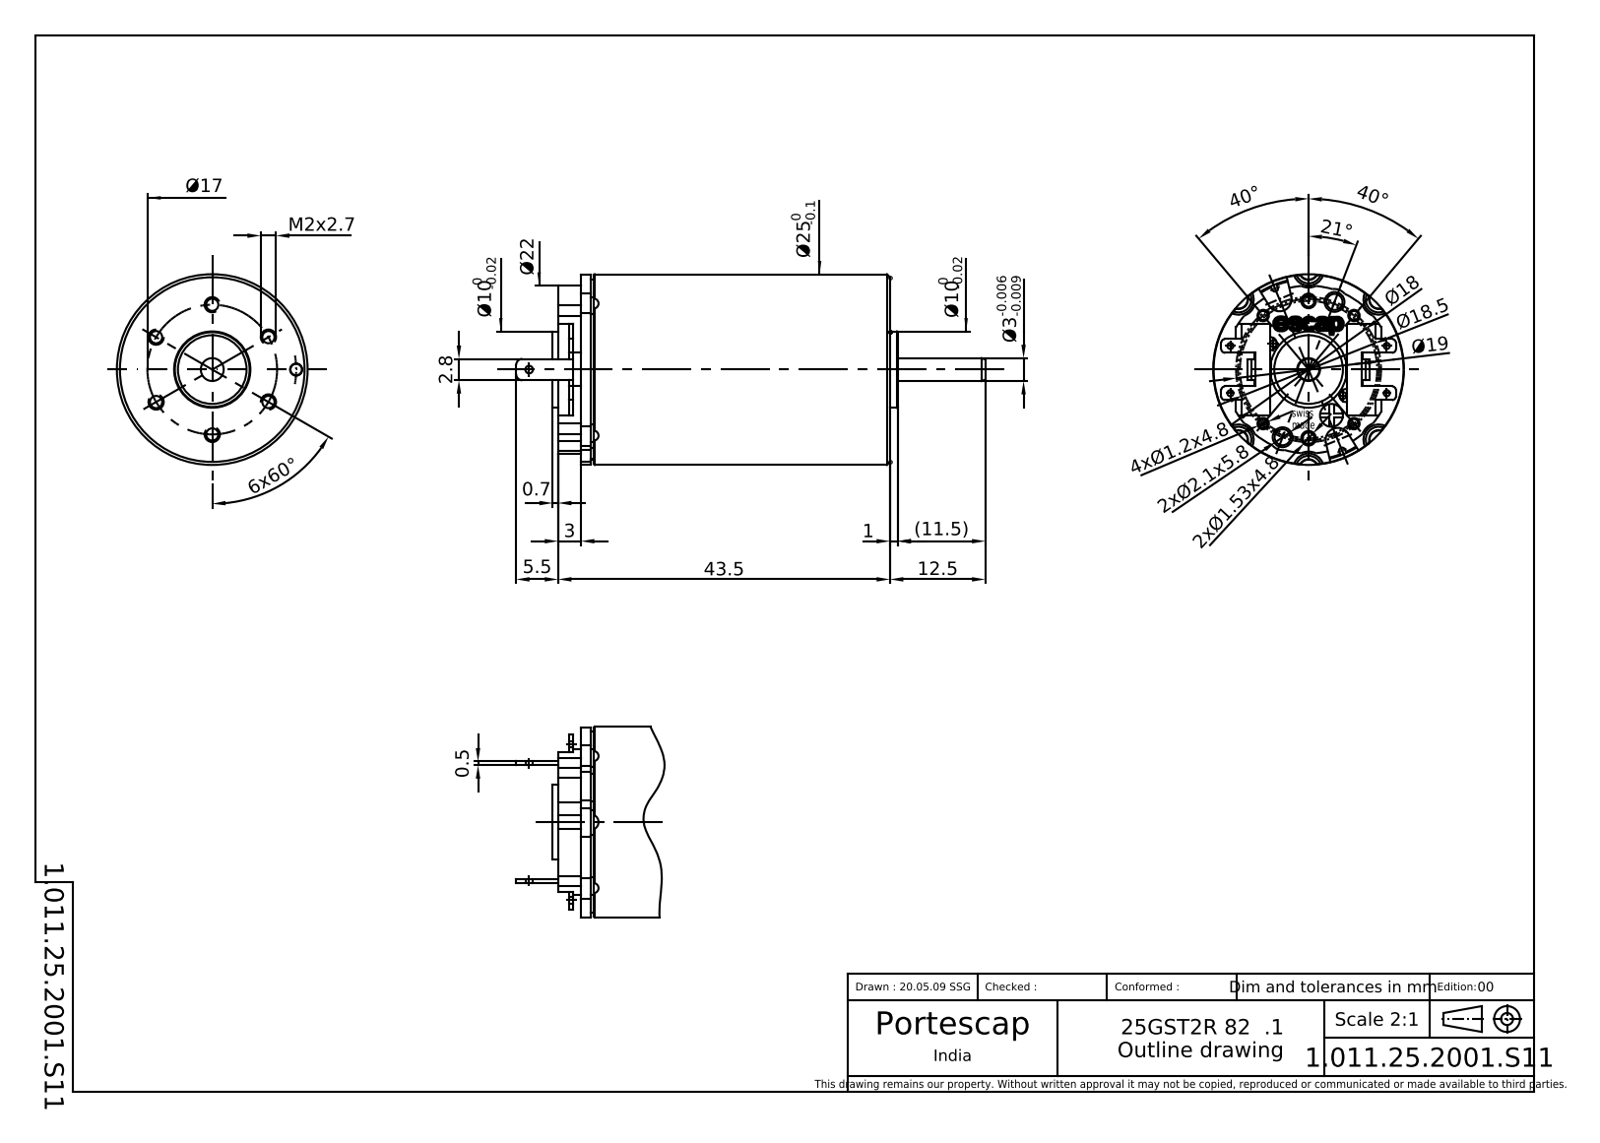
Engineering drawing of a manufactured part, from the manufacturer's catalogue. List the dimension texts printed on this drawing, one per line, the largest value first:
6x60°
43.5
40°
40°
21°
Ø19
Ø18.5
Ø18
12.5
(11.5)
5.5
3
Ø3
2.8
2xØ2.1x5.8
M2x2.7
2xØ1.53x4.8
4xØ1.2x4.8
1
0.7
0.5
